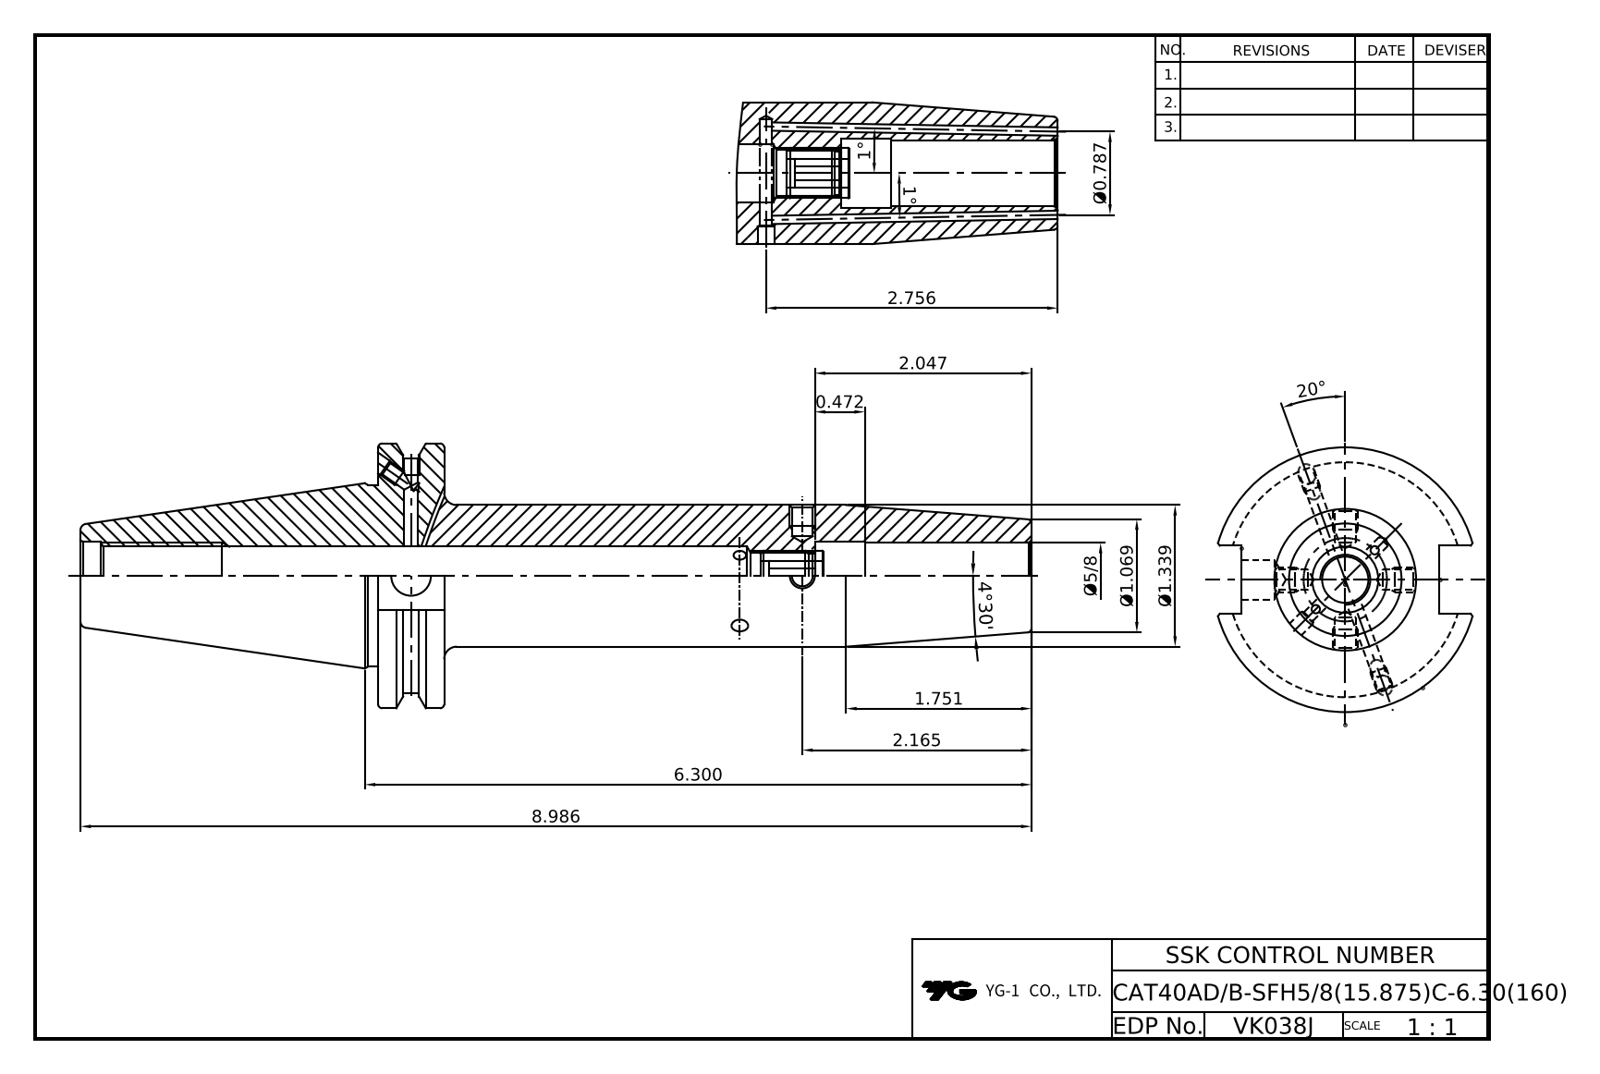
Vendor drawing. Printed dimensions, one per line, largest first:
20°
8.986
6.300
4°30'
2.756
2.165
2.047
1.751
Ø1.339
Ø1.069
1°
1°
Ø0.787
0.472
